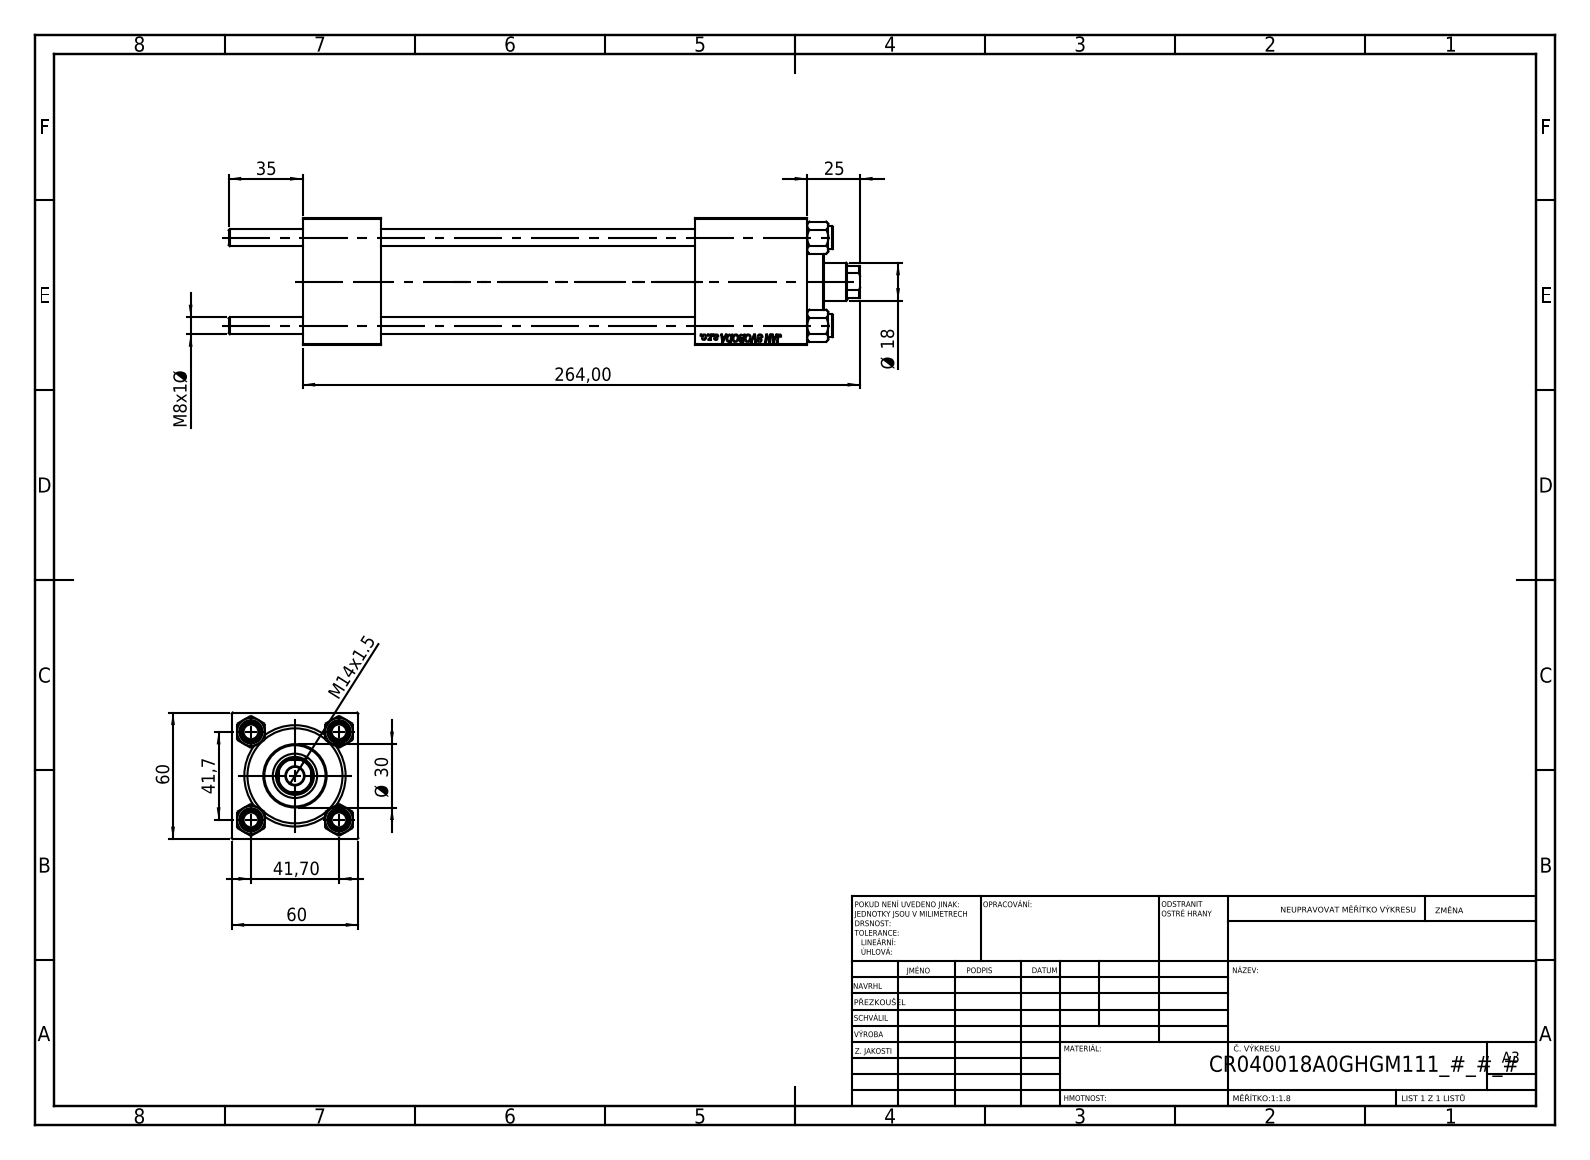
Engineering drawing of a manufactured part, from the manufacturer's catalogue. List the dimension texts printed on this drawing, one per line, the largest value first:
264,00
60
60
41,7
41,70
35
Ø 30
25
Ø 18
M14x1.5
M8x1 Ø
